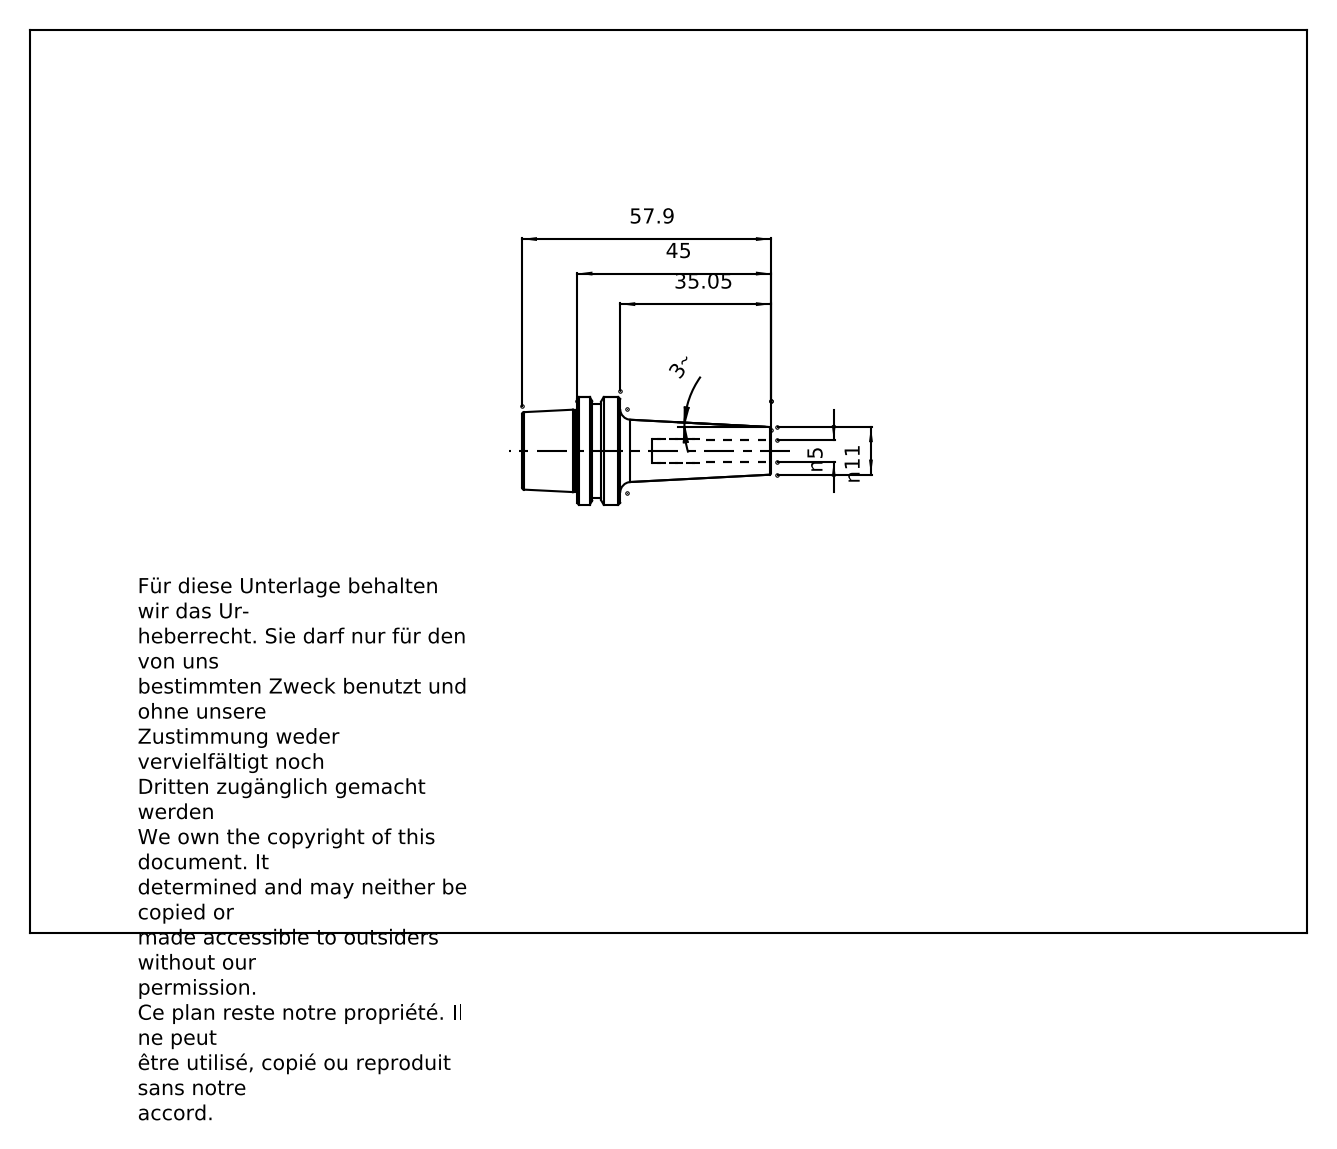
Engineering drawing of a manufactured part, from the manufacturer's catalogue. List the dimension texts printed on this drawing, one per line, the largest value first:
57.9
45
35.05
n11
n5
